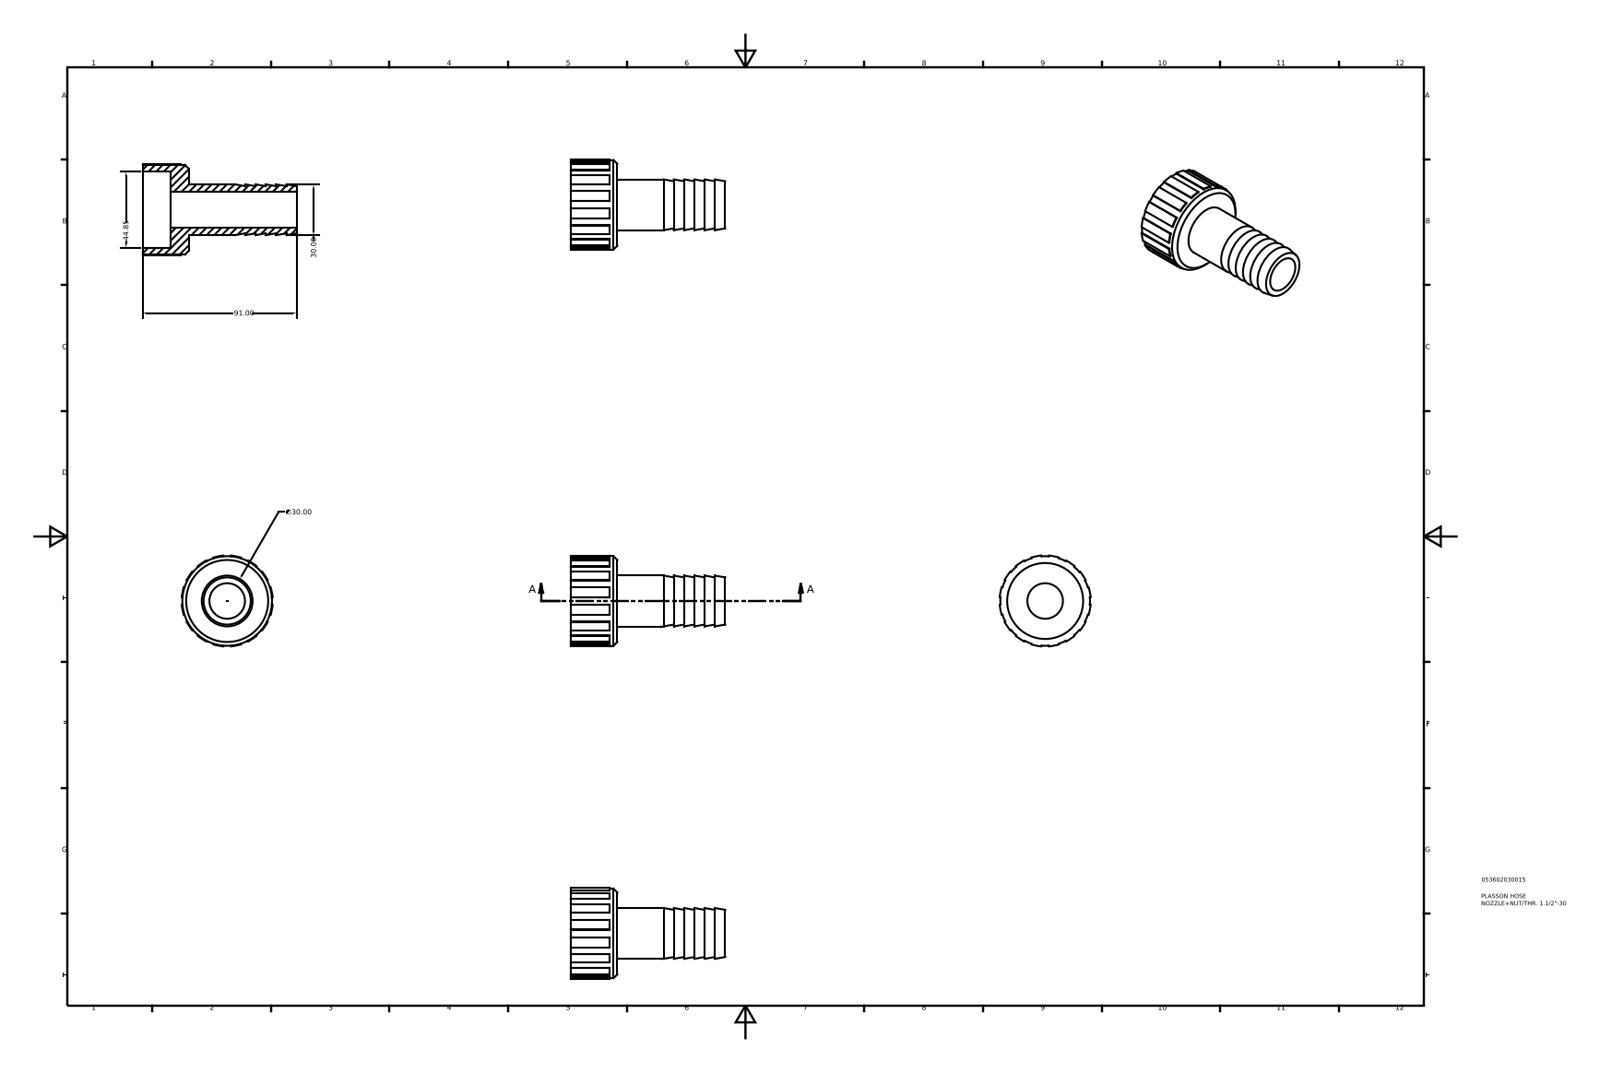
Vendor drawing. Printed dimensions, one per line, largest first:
91.00
44.85
30.00
∅30.00
